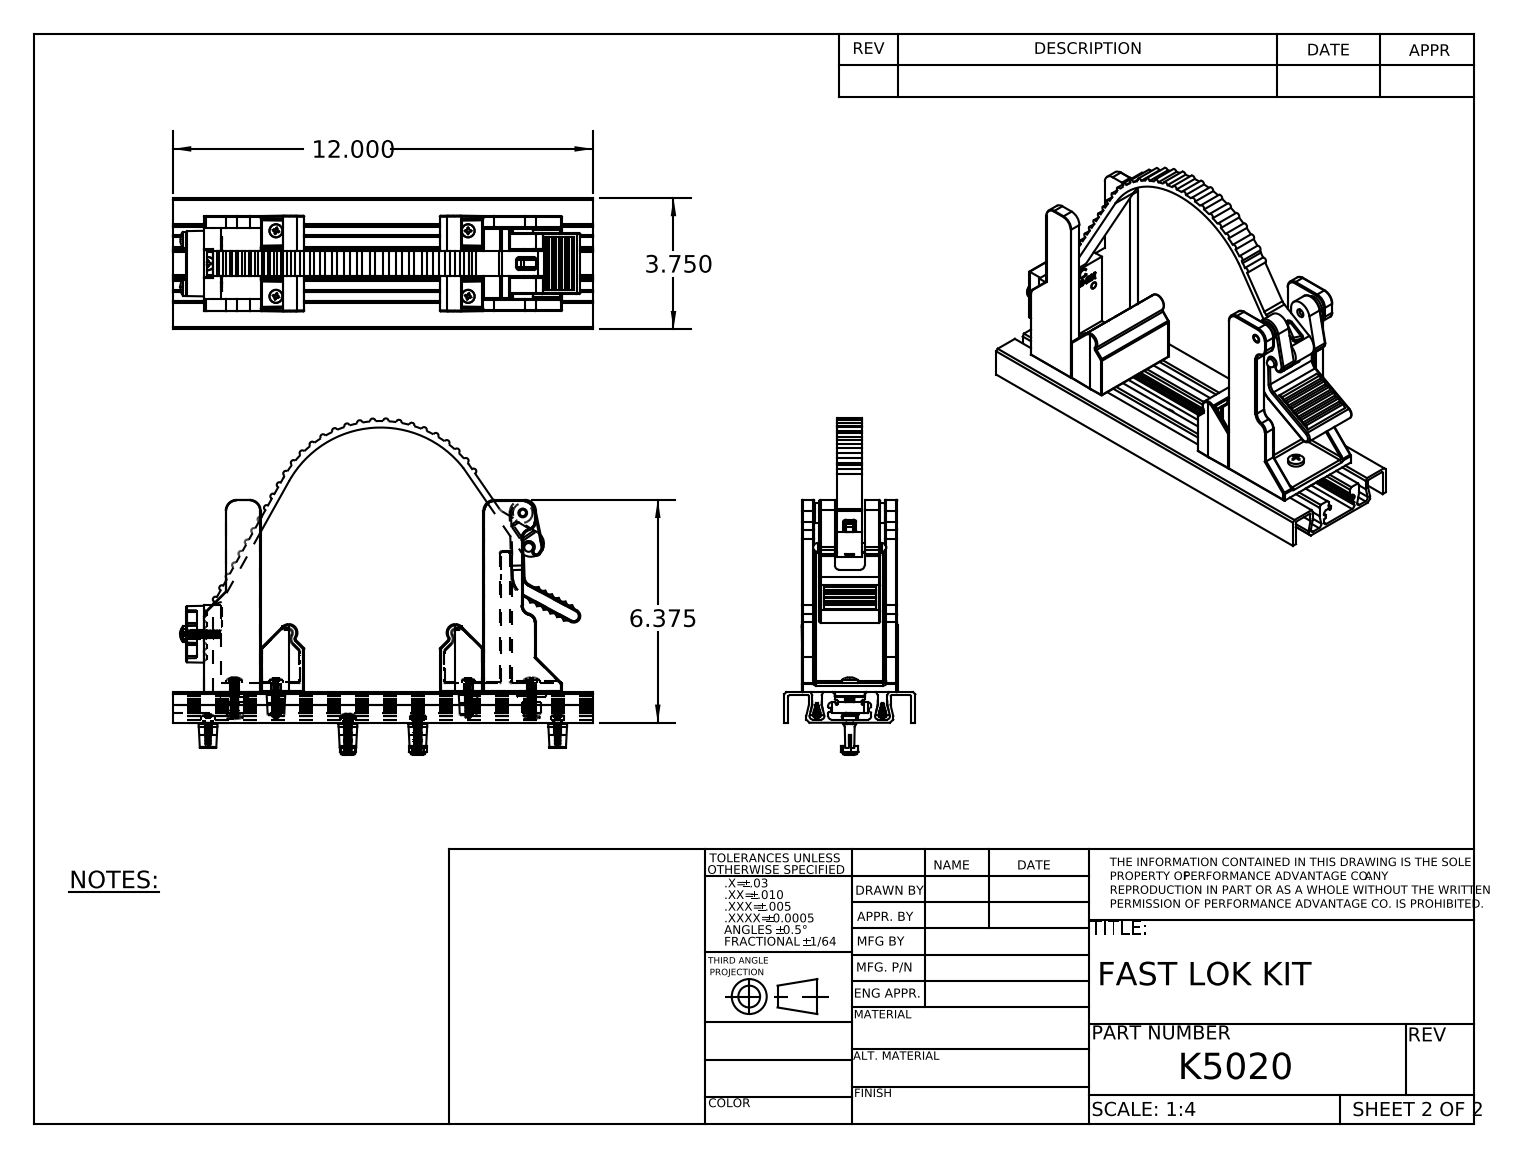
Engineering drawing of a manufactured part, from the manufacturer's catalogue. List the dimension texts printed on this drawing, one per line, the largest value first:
12.000
6.375
3.750
